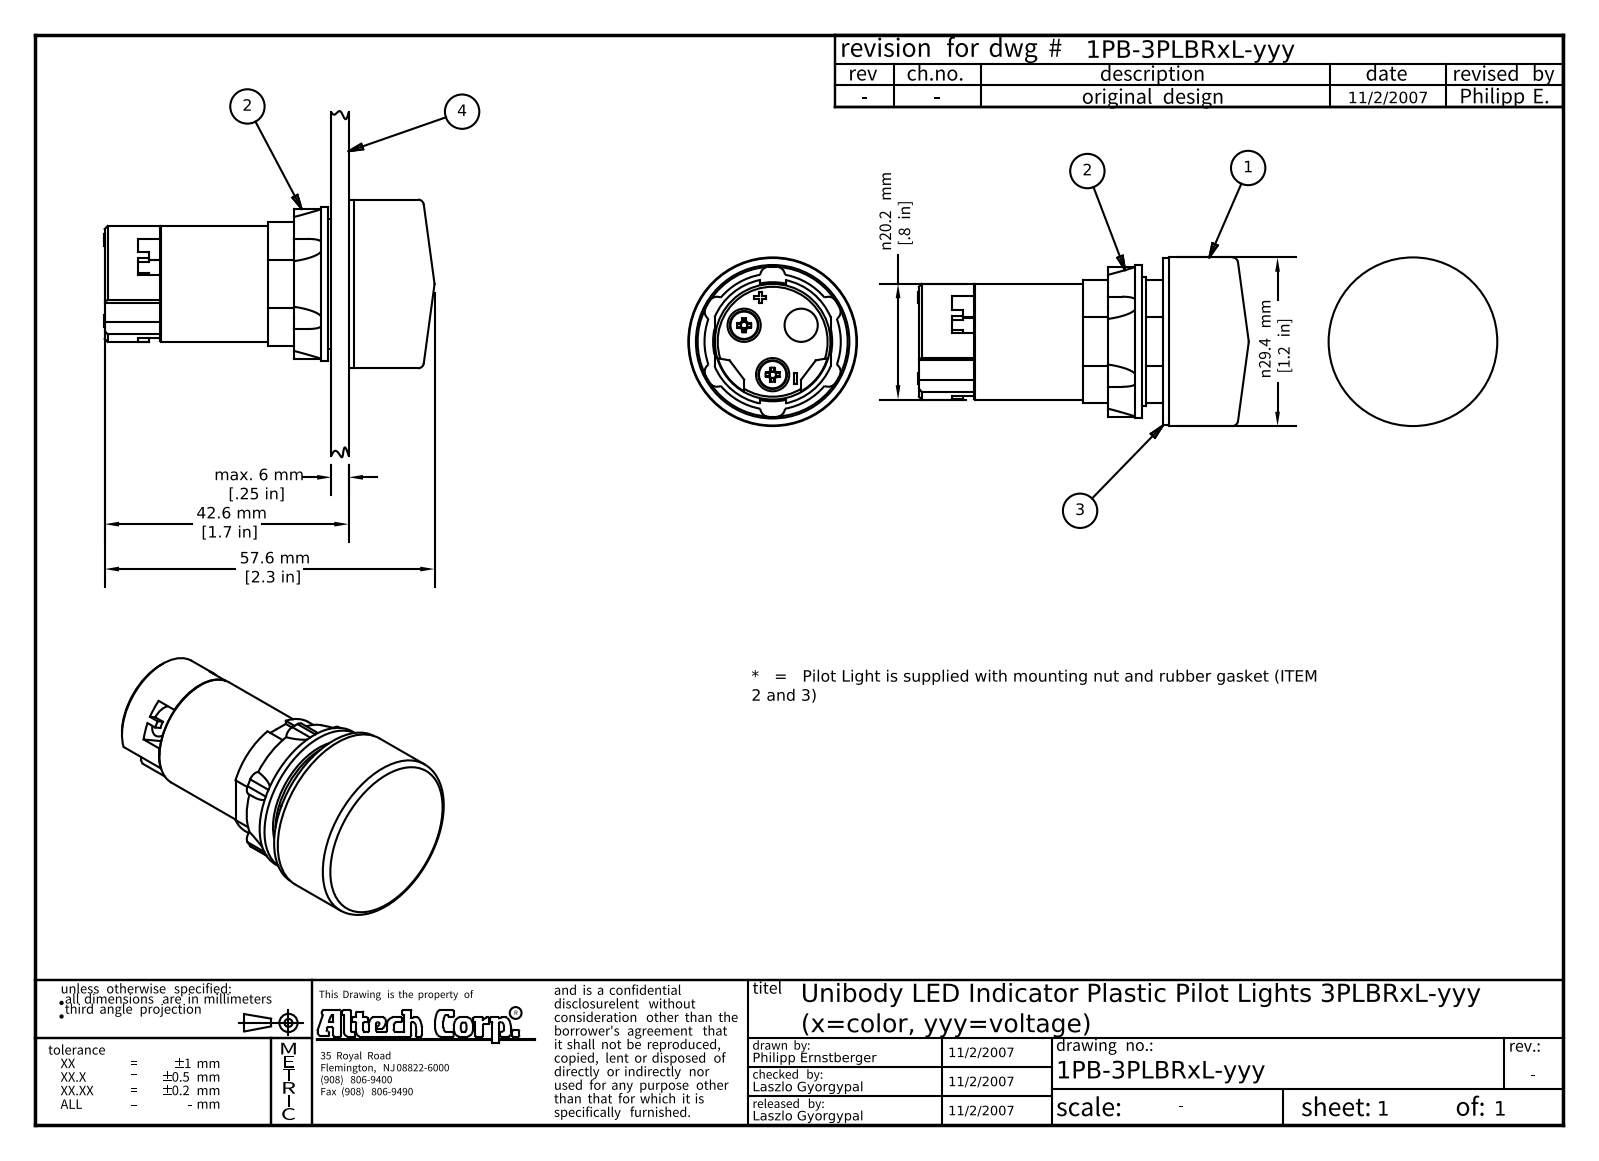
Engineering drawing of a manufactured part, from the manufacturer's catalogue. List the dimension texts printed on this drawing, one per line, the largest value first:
57.6 mm [2.3 in]
42.6 mm [1.7 in]
n29.4 mm [1.2 in]
n20.2 mm [.8 in]
max. 6 mm [.25 in]
